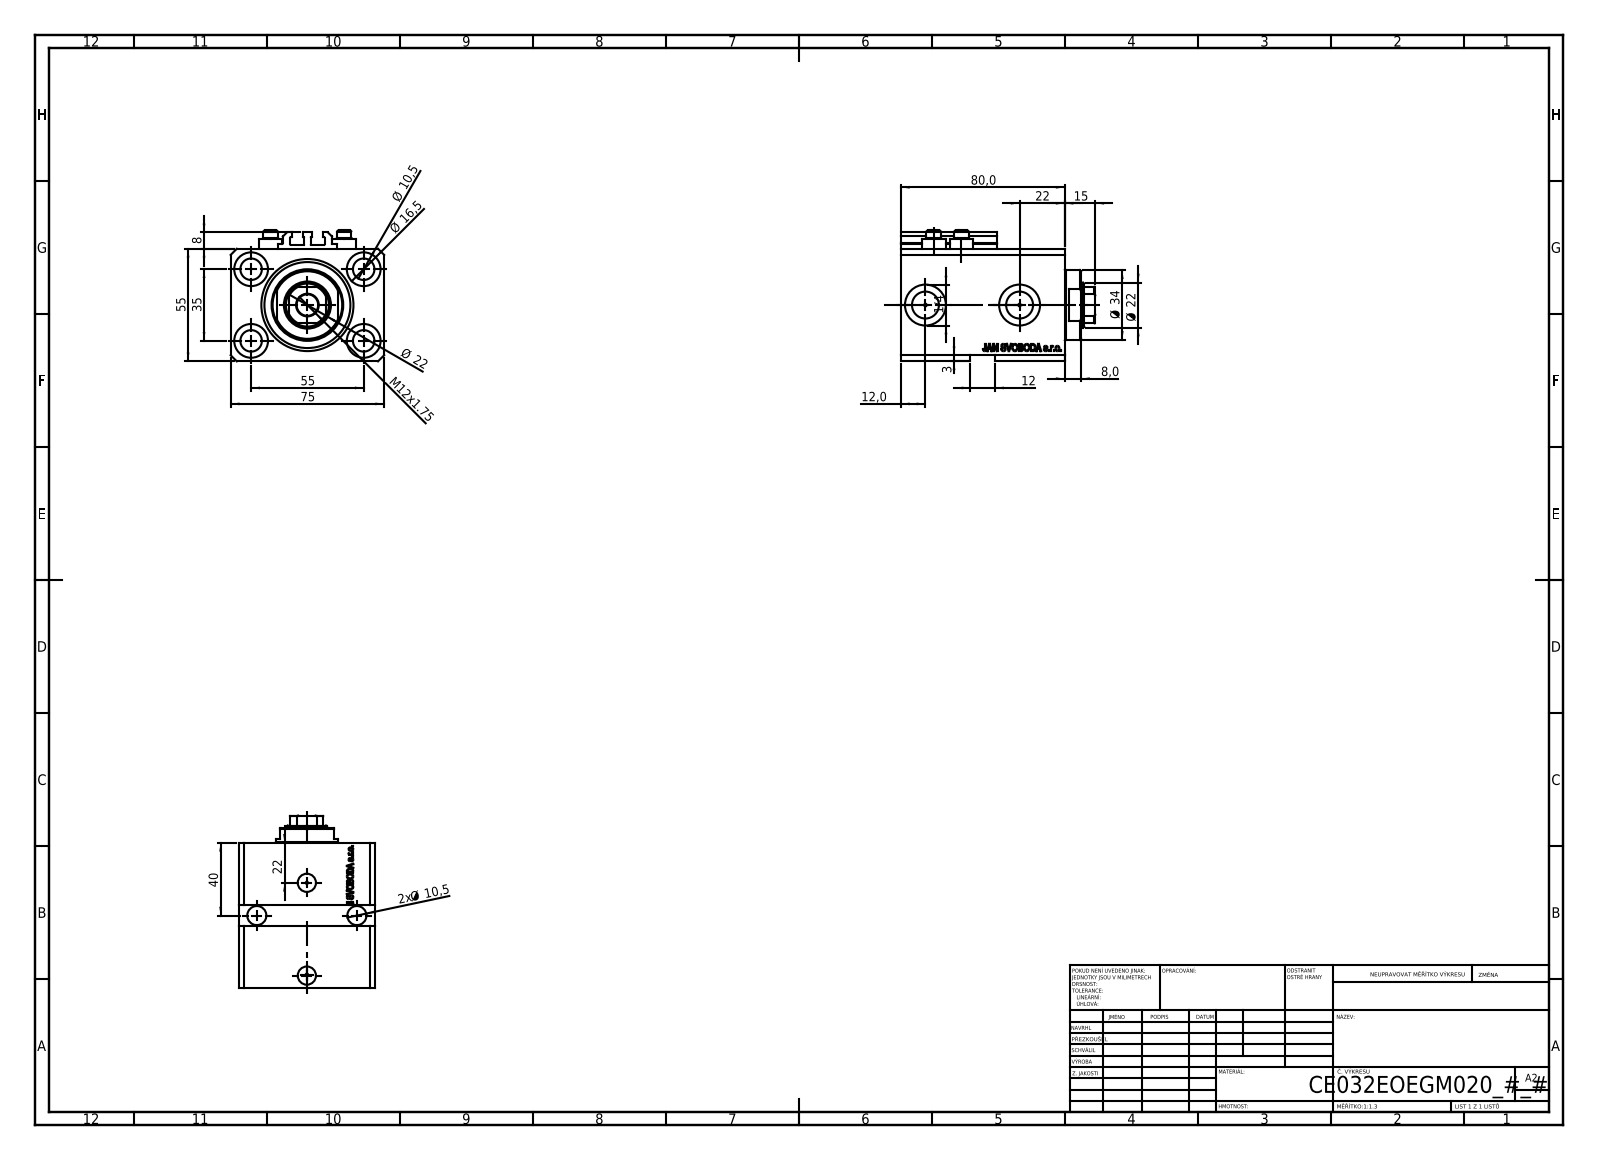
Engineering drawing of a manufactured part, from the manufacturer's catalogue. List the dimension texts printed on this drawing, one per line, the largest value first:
80,0
75
55
55
40
35
Ø 34
Ø 22
22
Ø 22
22
Ø 16,5
15
M12x1.75
12,0
12
Ø 10,5
2x Ø 10,5
8
8,0
3
1/4
